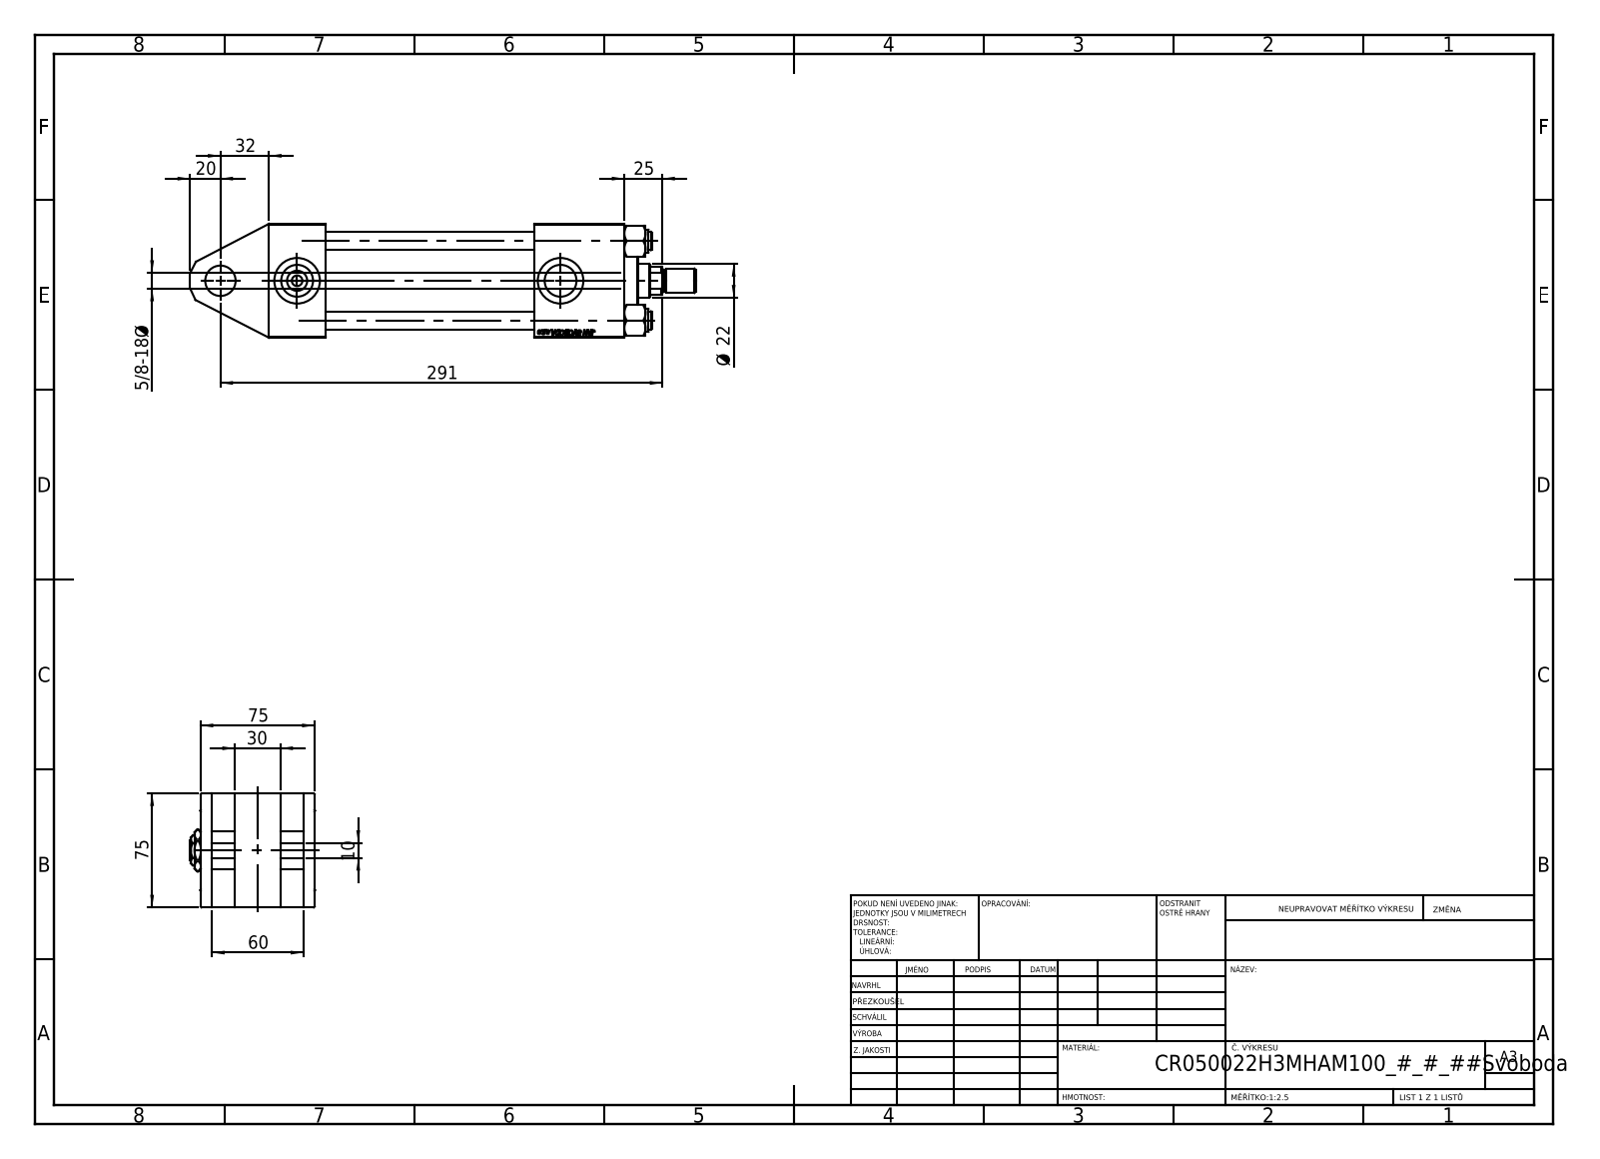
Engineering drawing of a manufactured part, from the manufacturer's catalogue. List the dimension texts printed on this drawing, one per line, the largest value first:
291
75
75
60
32
30
25
Ø 22
20
10
5/8-18 Ø
